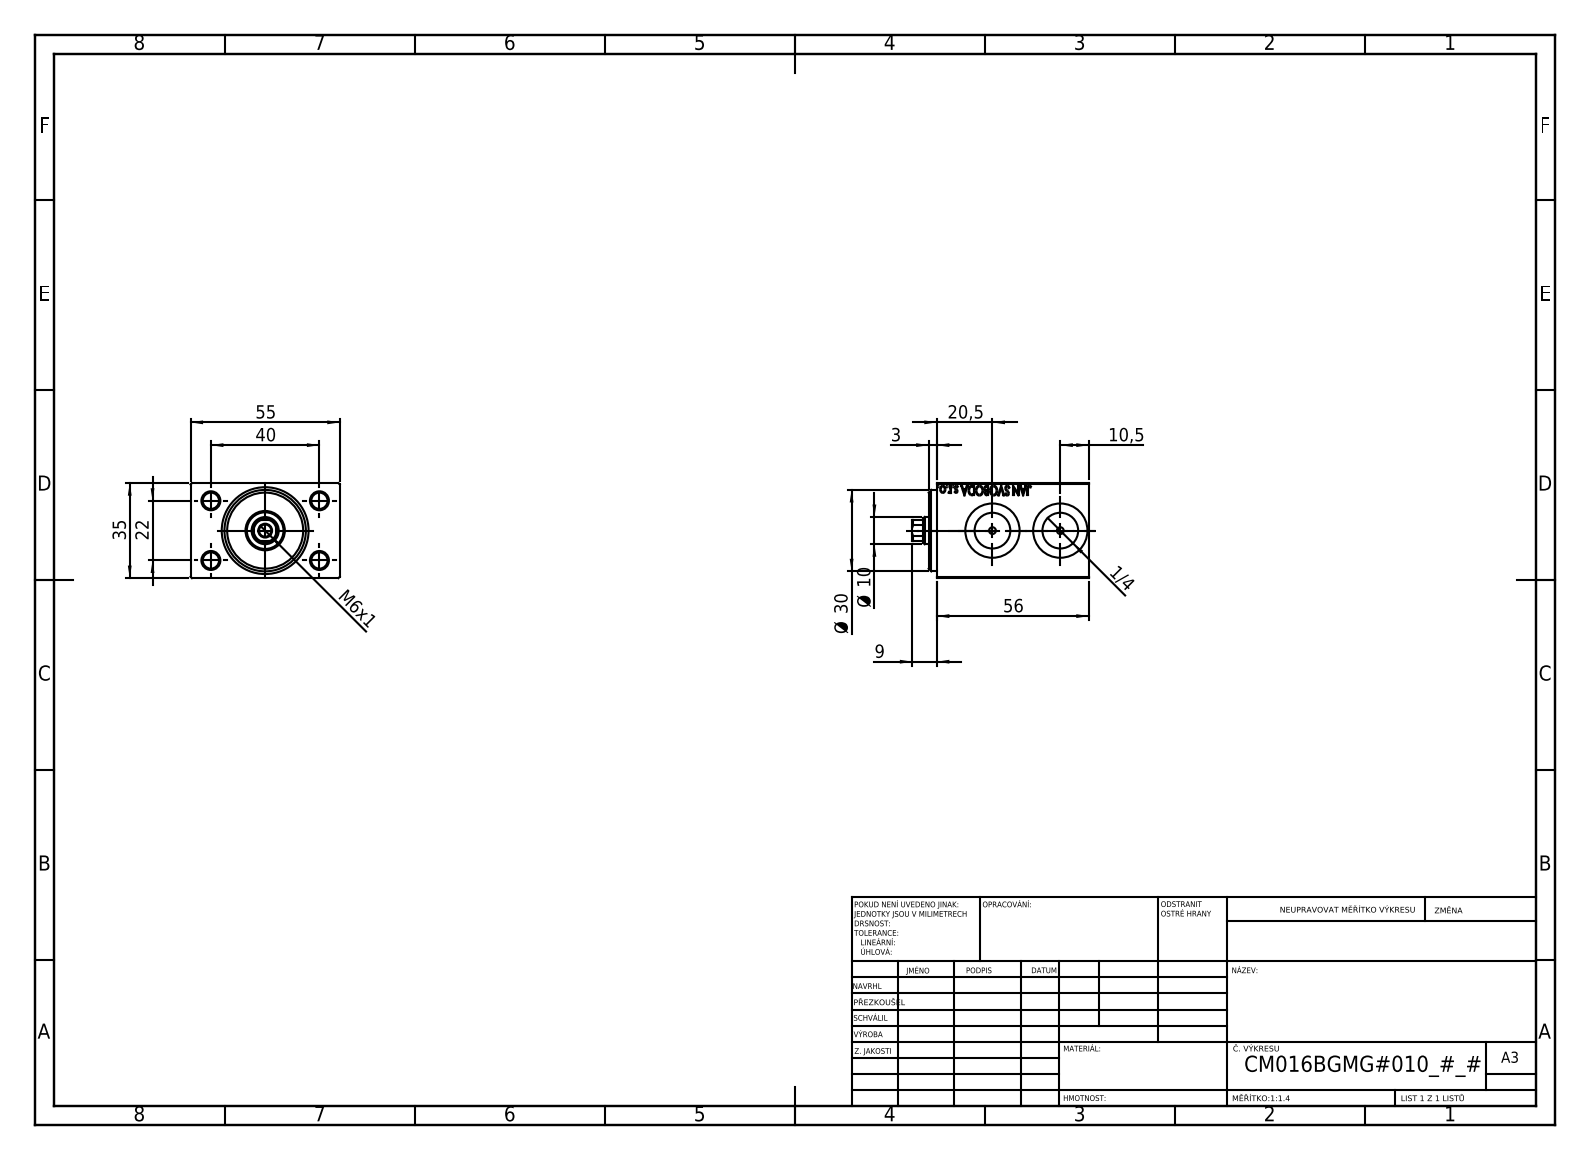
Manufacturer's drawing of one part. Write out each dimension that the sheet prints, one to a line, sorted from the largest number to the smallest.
56
55
40
35
Ø 30
22
20,5
10,5
Ø 10
9
M6x1
3
1/4
